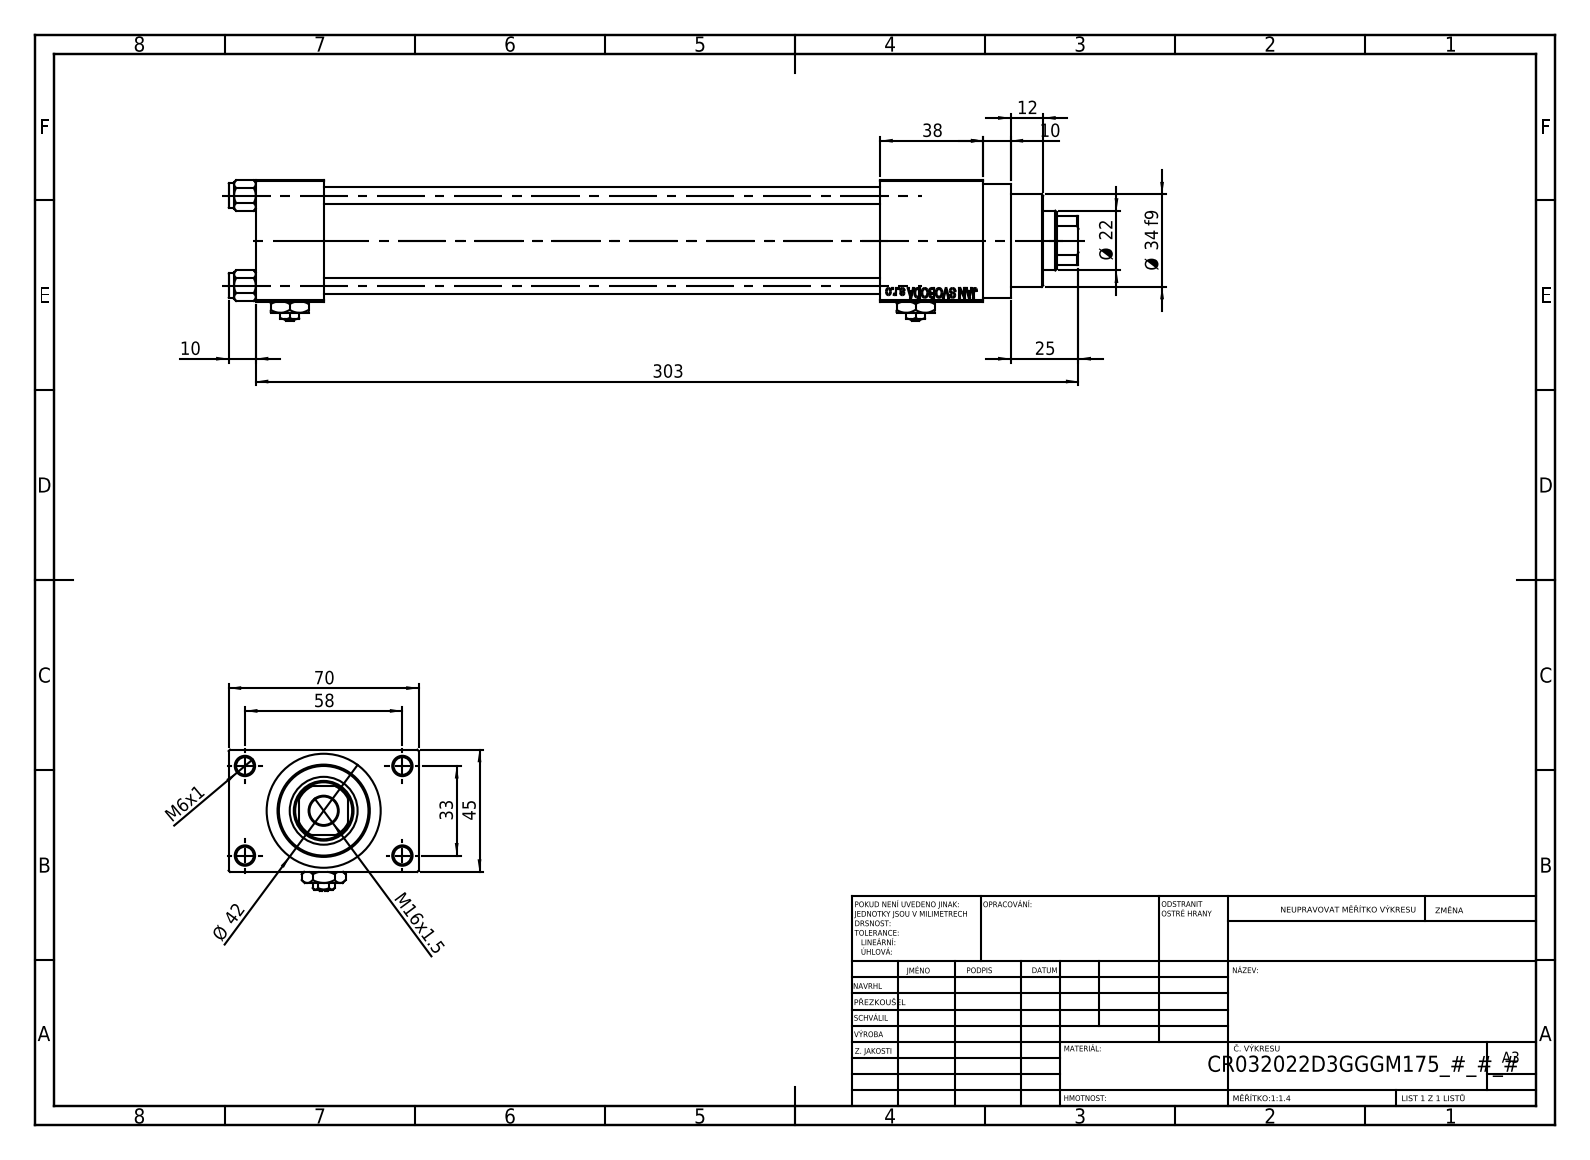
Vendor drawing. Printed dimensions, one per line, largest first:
303
70
58
45
Ø 42
38
Ø 34 f9
33
25
Ø 22
M16x1.5
12
10
10
M6x1
